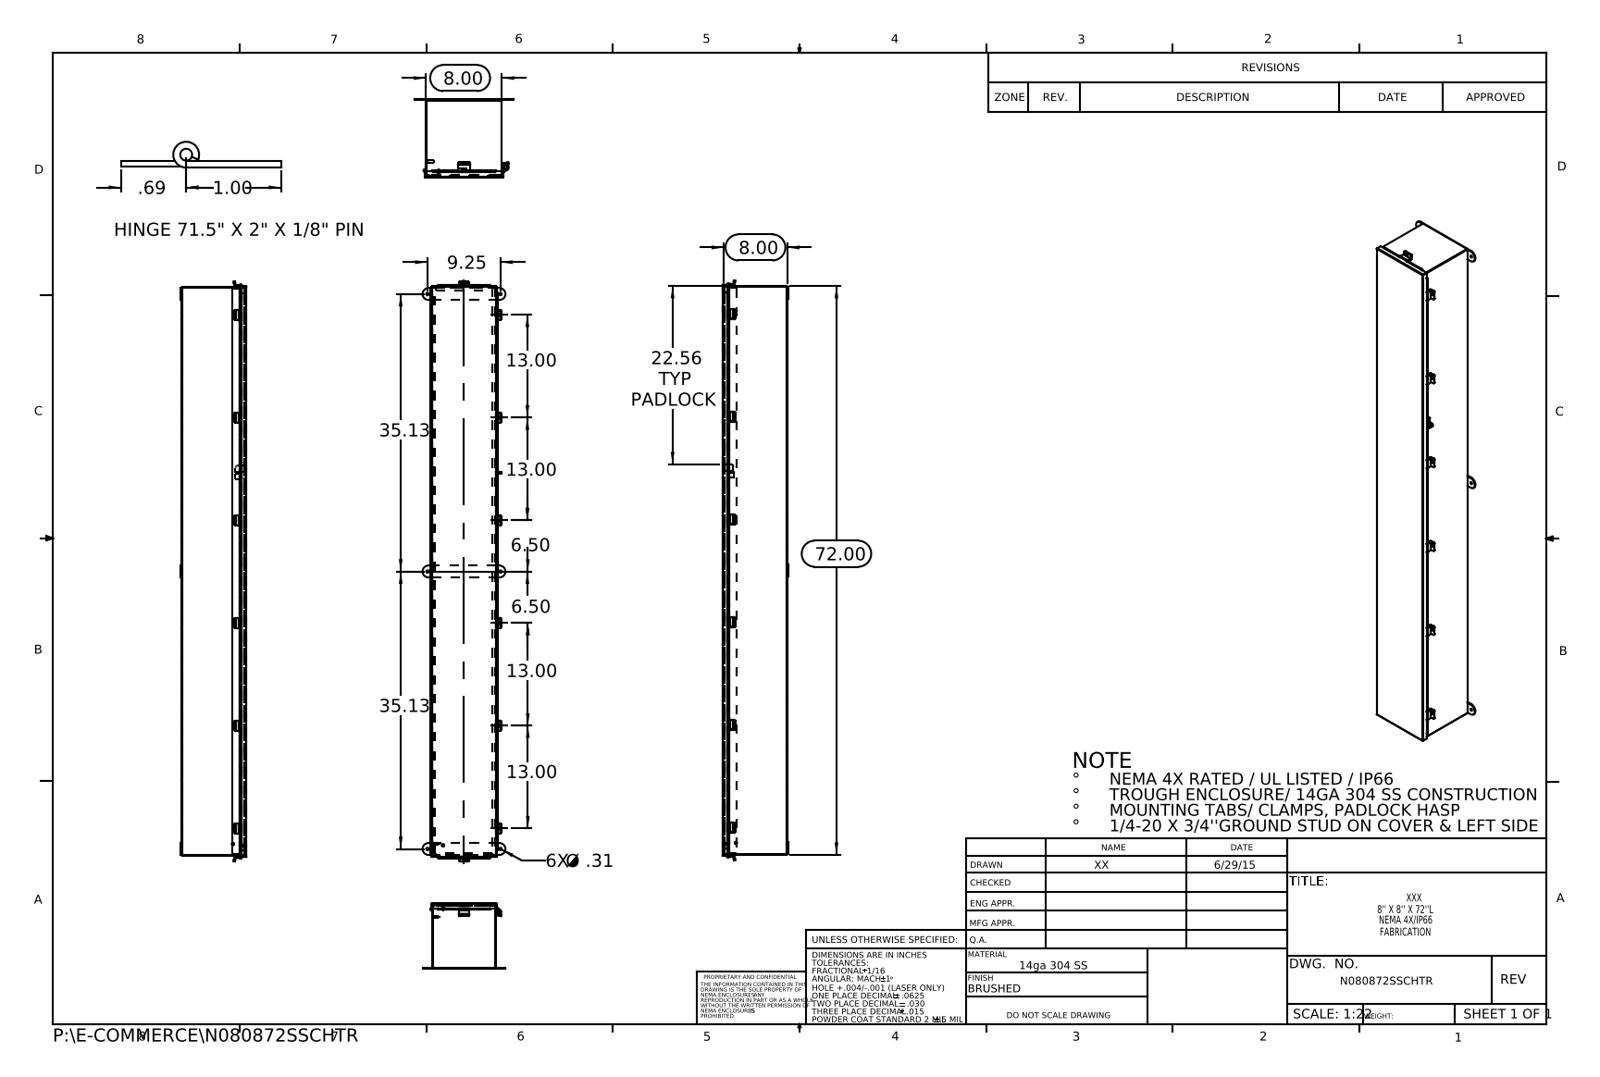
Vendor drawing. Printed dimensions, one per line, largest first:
72.00
35.13
35.13
22.56 TYP PADLOCK
13.00
13.00
13.00
13.00
9.25
8.00
8.00
6.50
6.50
1.00
.69
6X Ø .31
